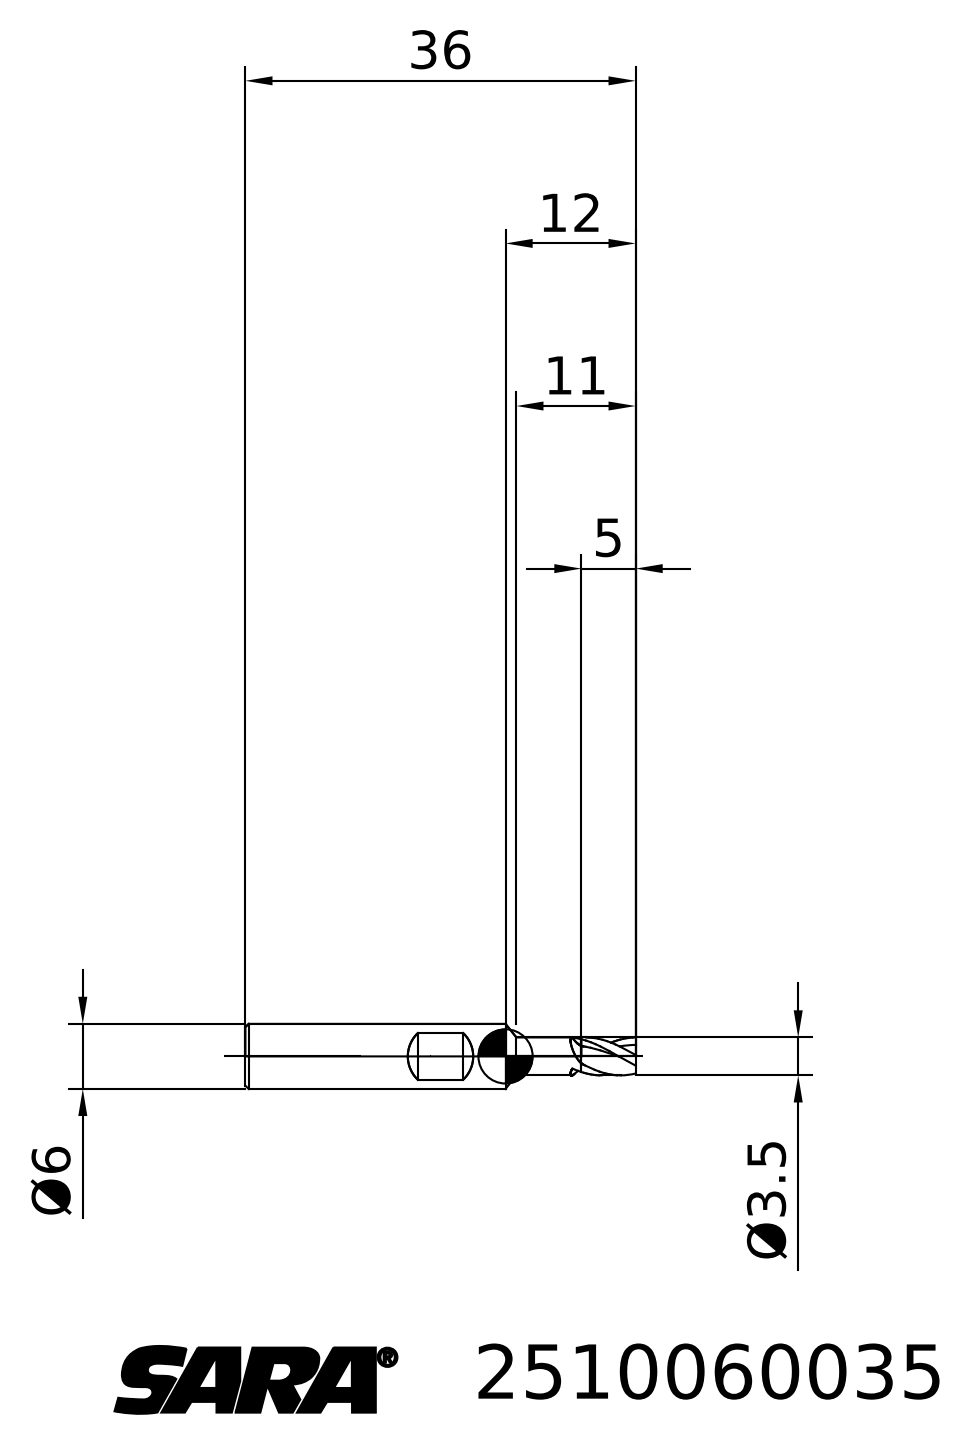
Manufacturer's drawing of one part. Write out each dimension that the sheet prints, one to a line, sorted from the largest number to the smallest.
36
12
11
Ø6
5
Ø3.5
